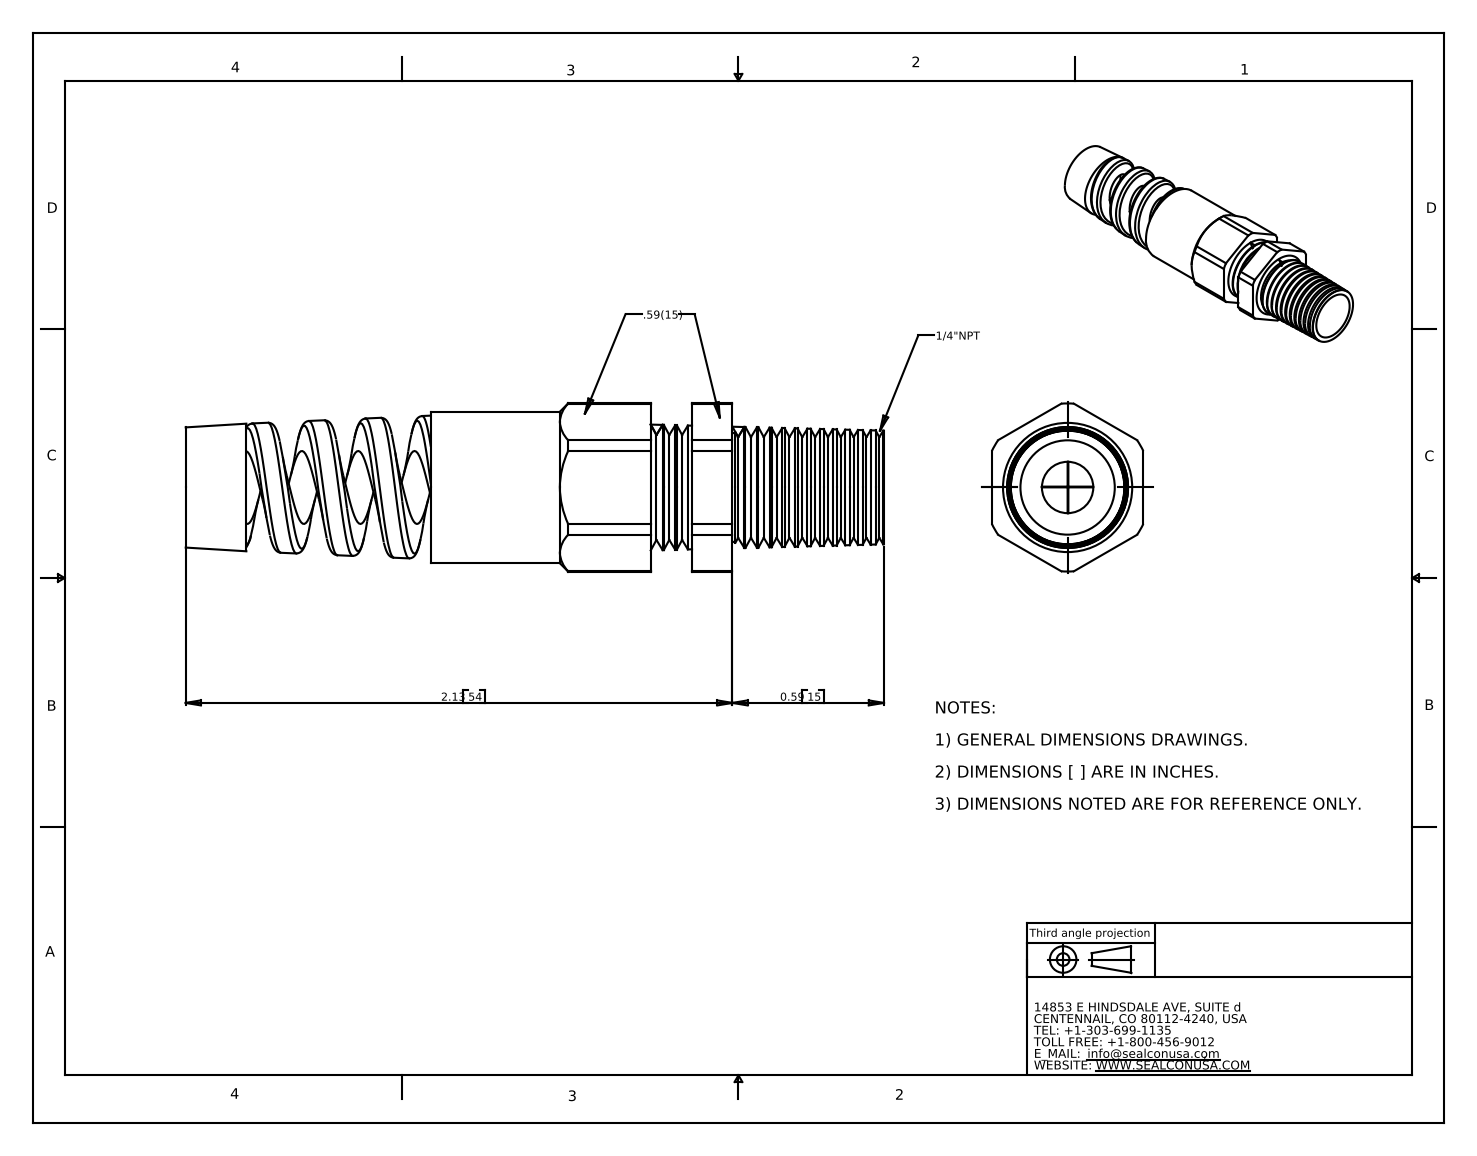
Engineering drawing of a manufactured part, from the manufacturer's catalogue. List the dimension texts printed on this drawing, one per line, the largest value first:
2.13 54
0.59 15
